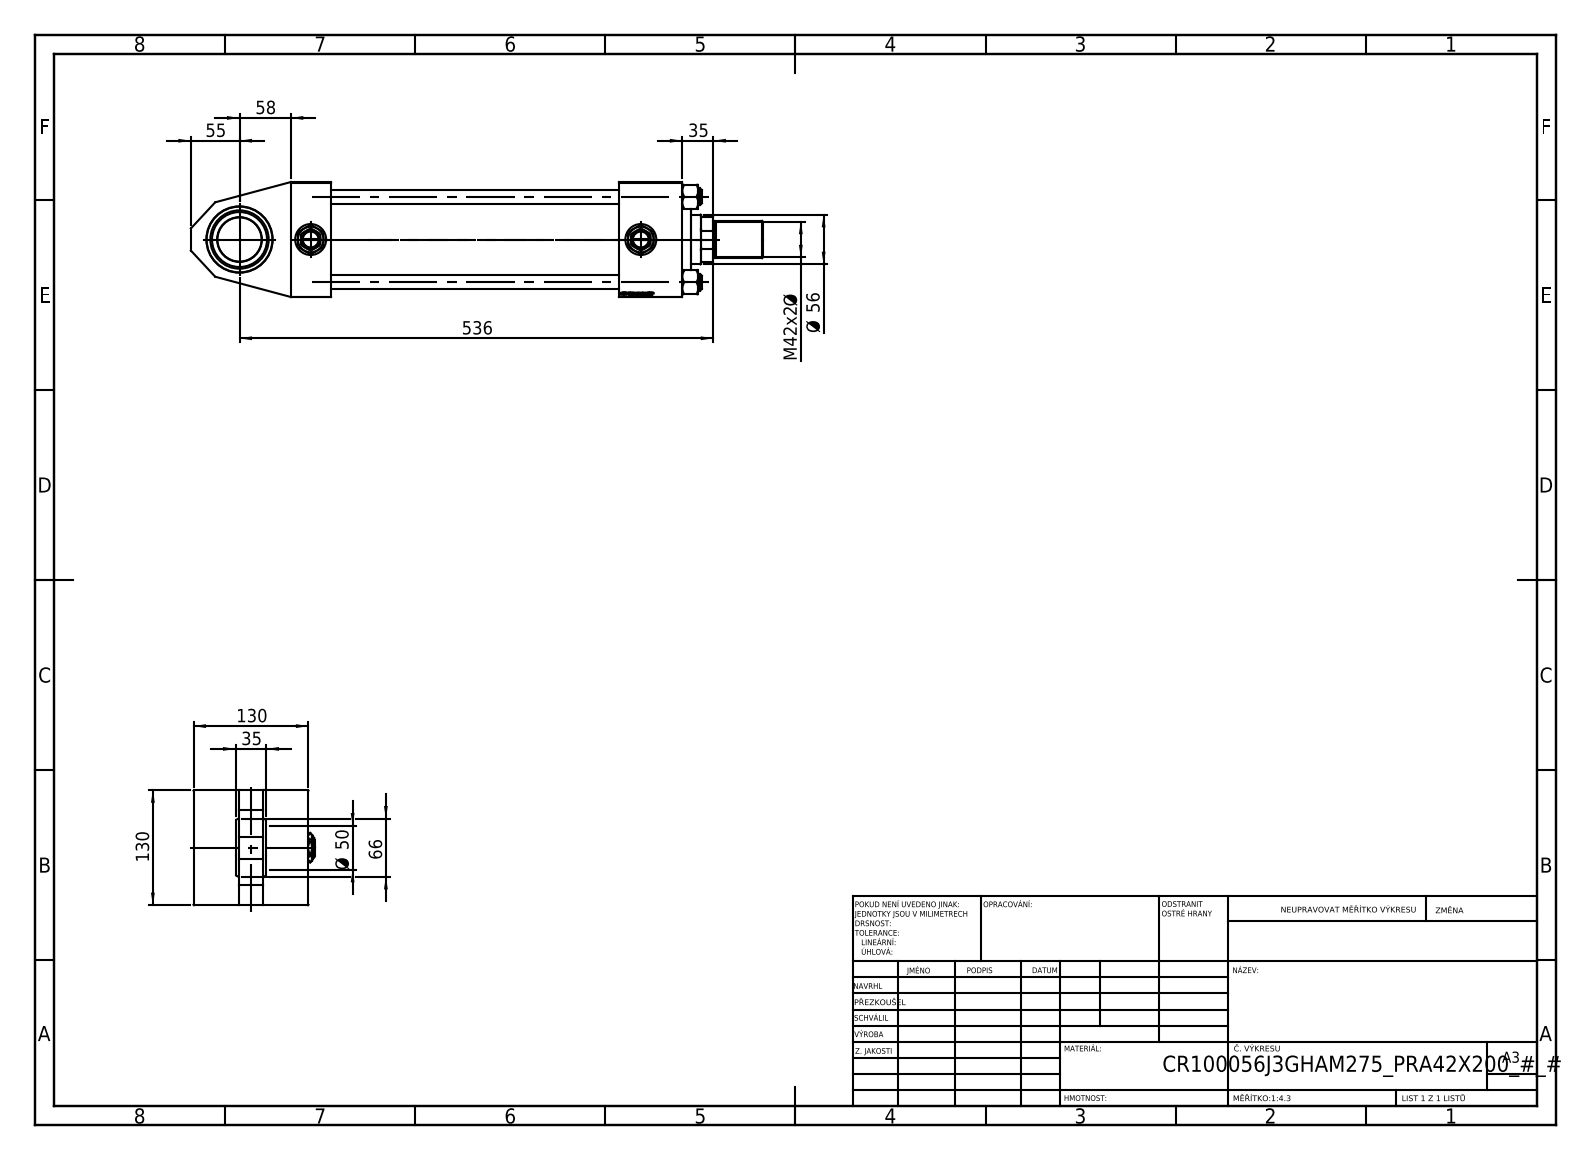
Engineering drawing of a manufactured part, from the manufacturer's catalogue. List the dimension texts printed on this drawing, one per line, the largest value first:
536
130
130
66
58
Ø 56
55
Ø 50
M42x2 Ø
35
35
